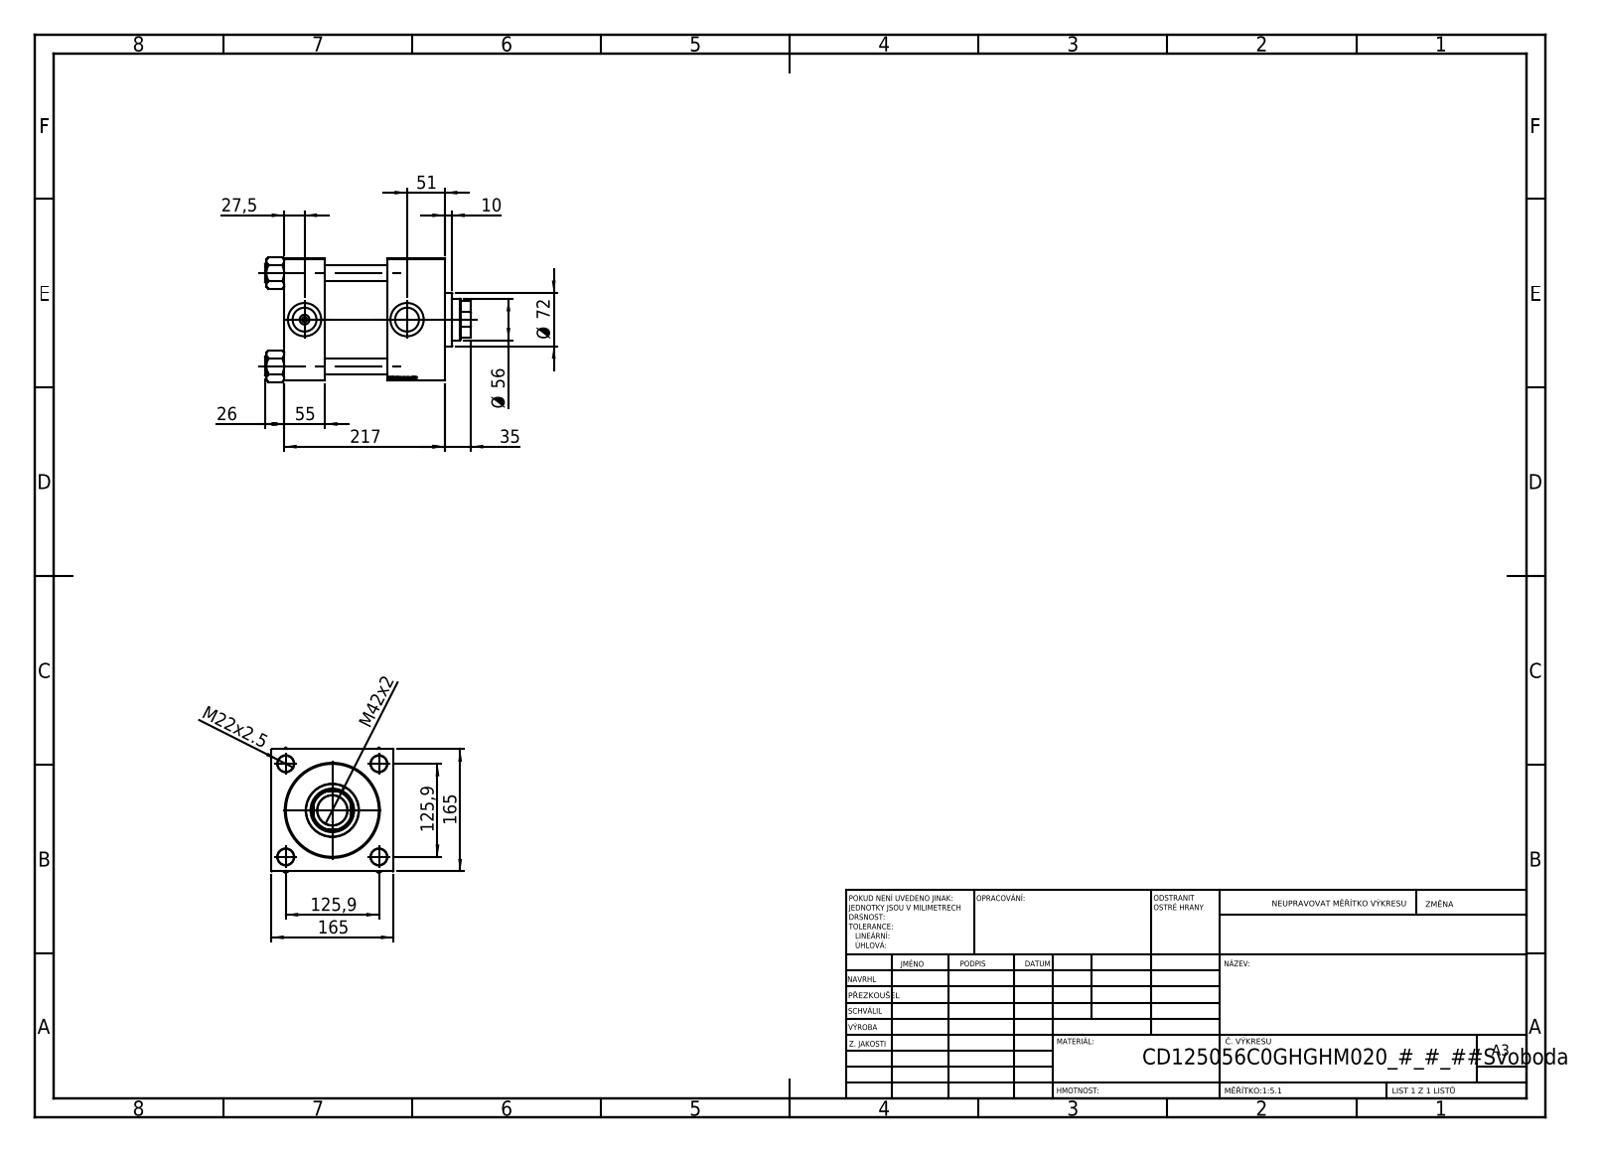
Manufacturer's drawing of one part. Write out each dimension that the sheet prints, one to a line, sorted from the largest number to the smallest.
217
165
165
125,9
125,9
Ø 72
Ø 56
55
51
M42x2
35
27,5
26
M22x2.5
10
